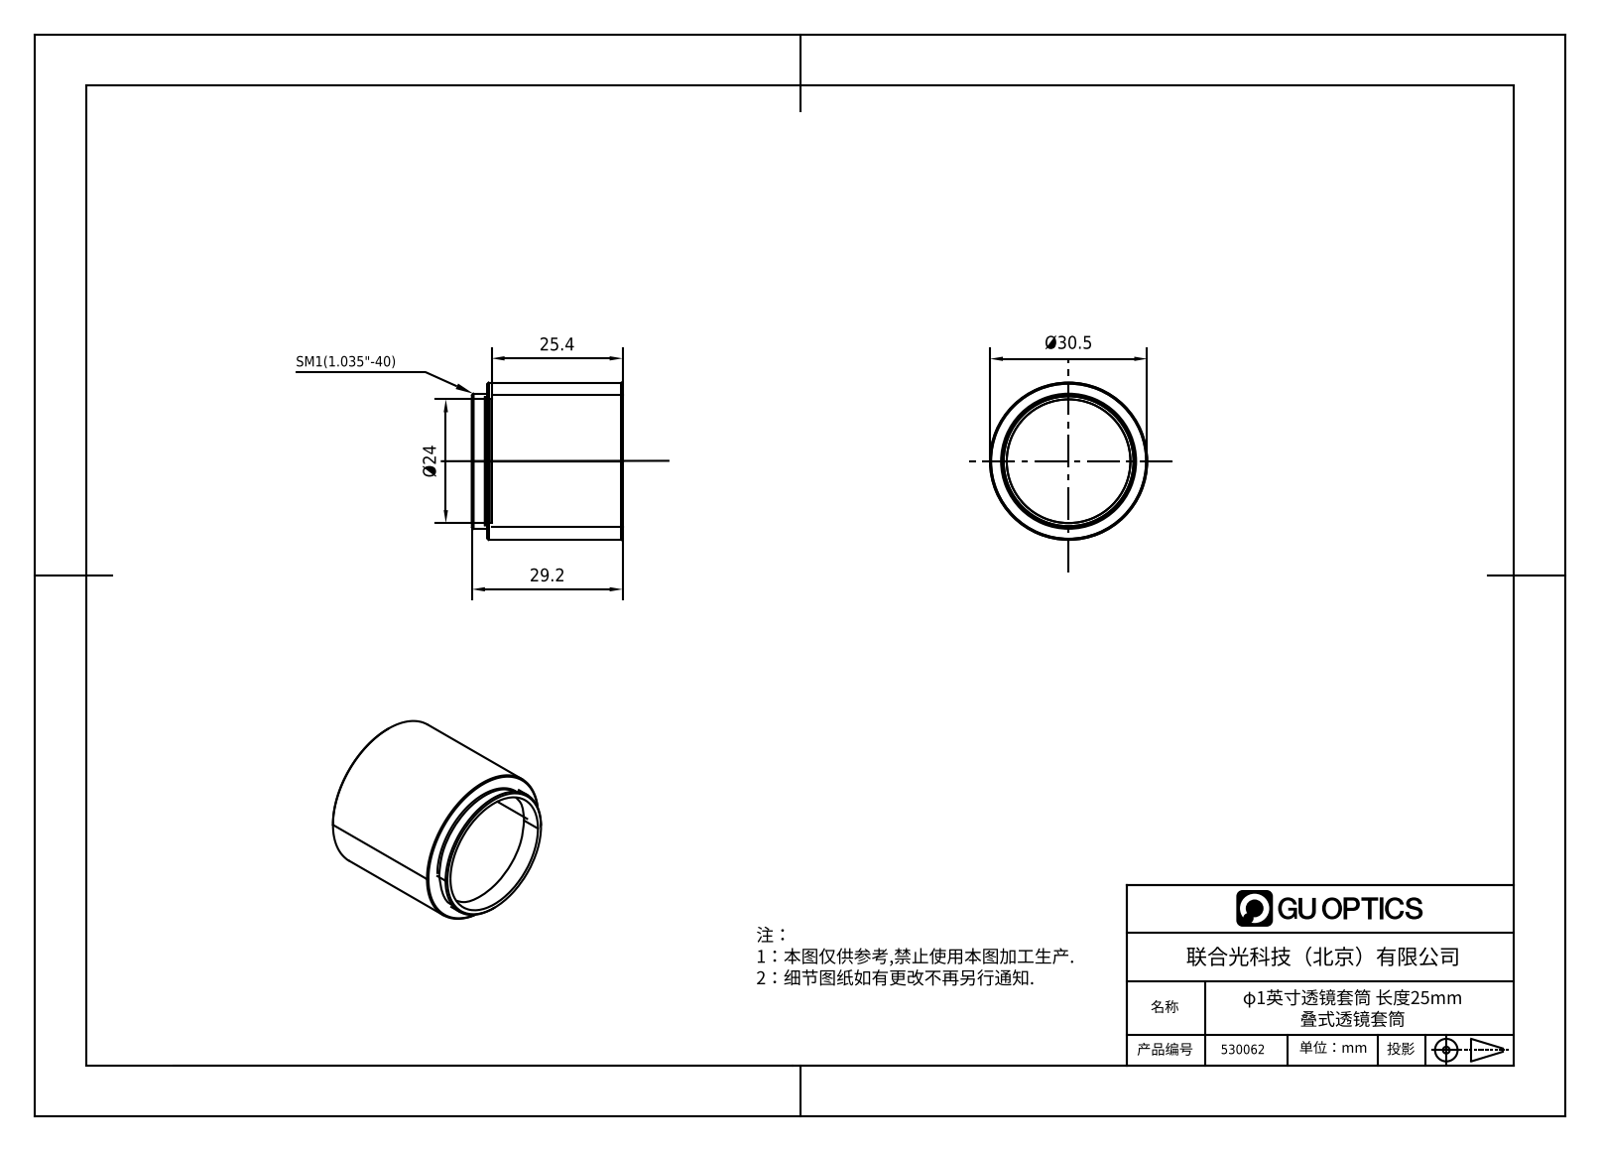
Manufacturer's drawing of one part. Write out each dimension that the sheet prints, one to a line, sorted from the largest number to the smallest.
Ø30.5
29.2
25.4
Ø24
